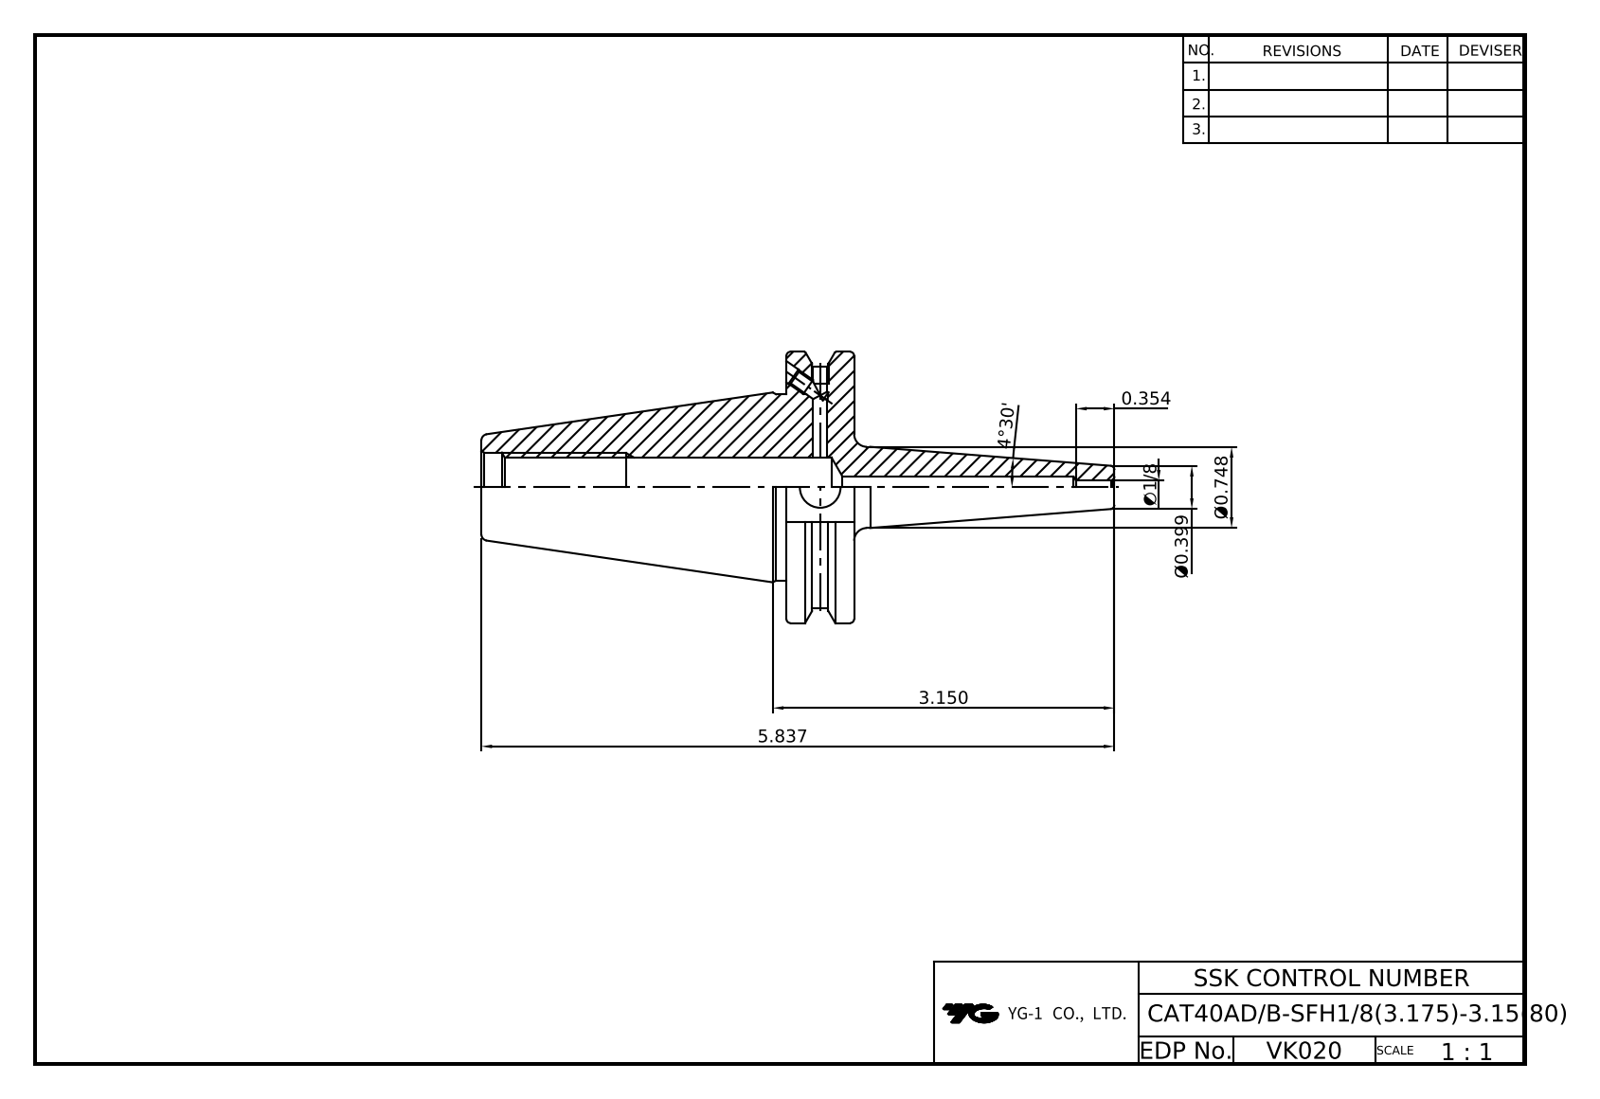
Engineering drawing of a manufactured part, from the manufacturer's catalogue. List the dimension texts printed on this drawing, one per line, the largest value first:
5.837
4°30'
3.150
Ø0.748
Ø0.399
0.354
